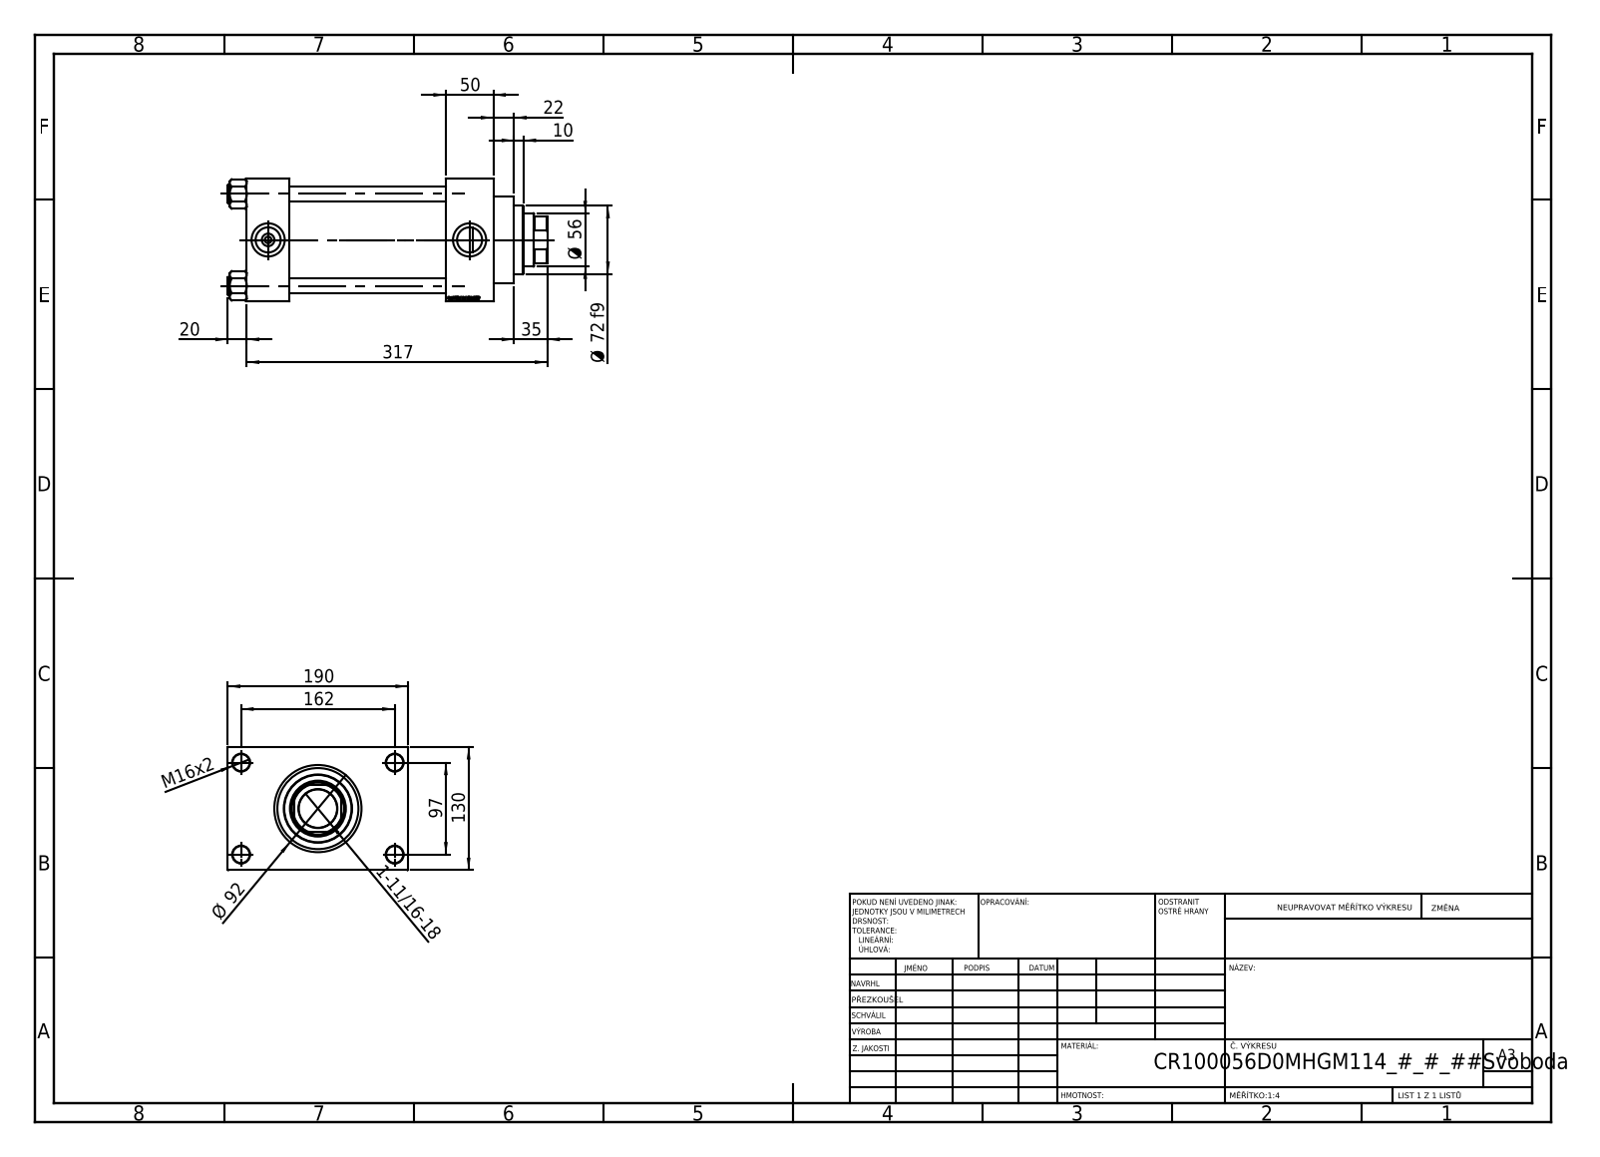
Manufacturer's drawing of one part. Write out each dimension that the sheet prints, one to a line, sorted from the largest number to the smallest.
317
190
162
130
97
Ø 92
Ø 72 f9
Ø 56
50
35
22
20
M16x2
10
1-11/16-18
